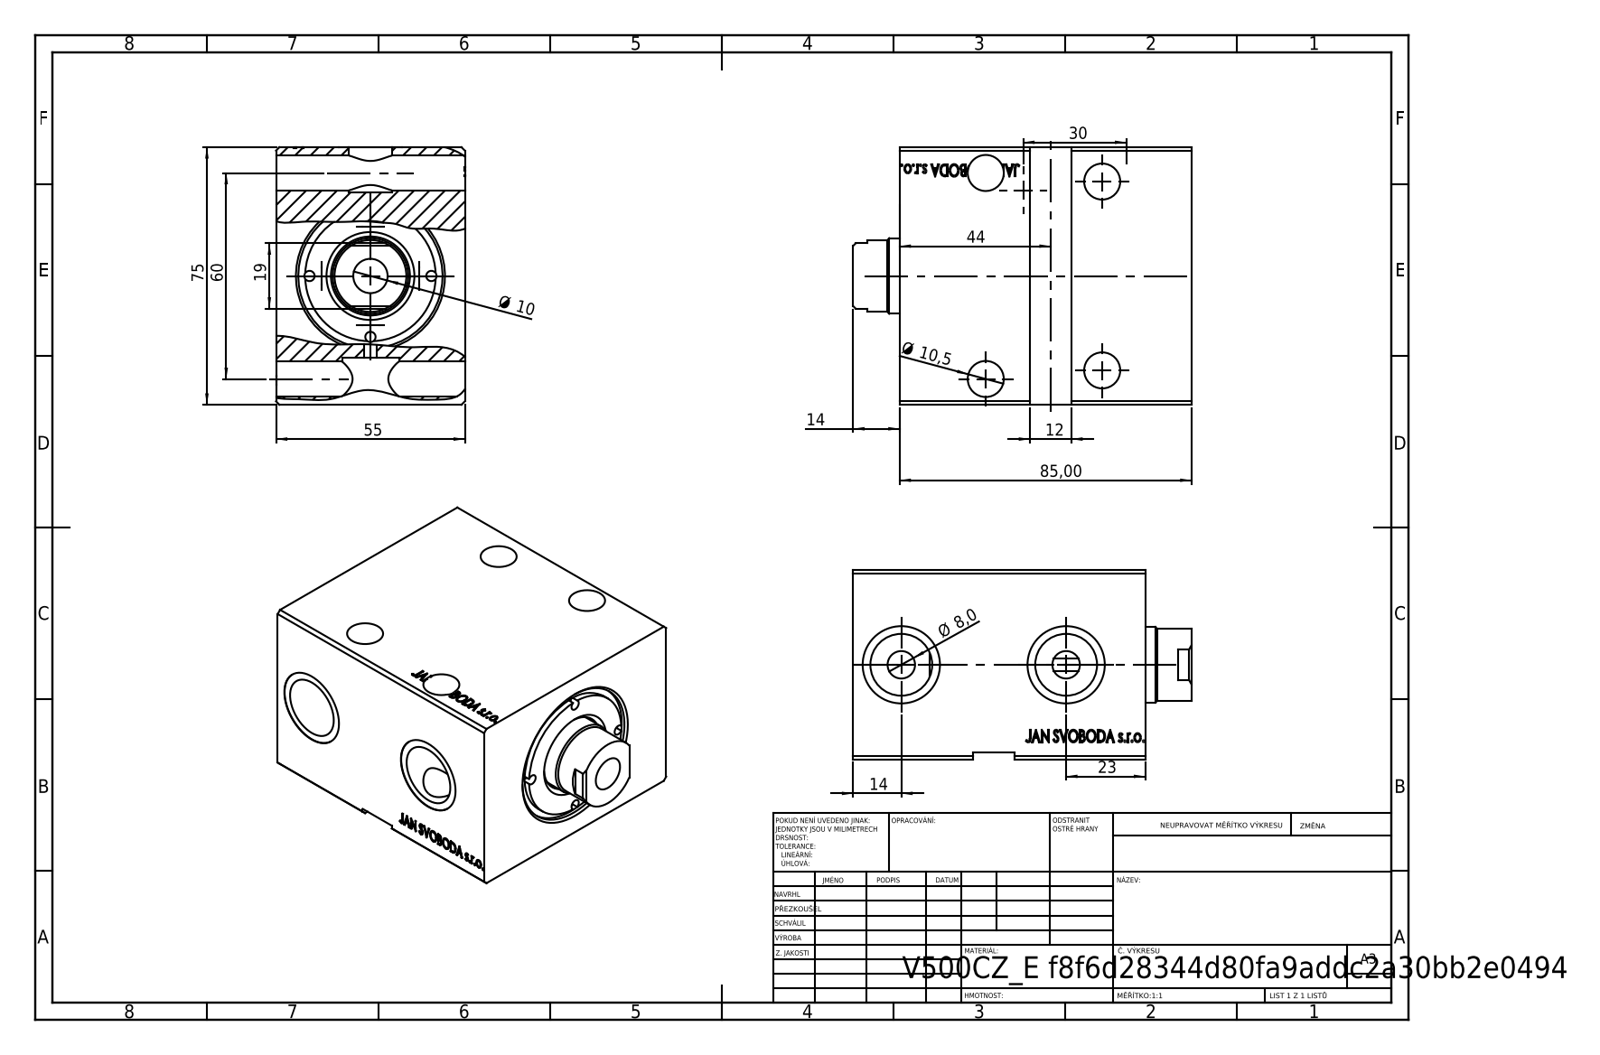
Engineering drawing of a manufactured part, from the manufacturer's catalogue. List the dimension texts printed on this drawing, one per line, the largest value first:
85,00
75
60
55
44
30
23
19
14
14
12
Ø 10,5
Ø 10
Ø 8,0
